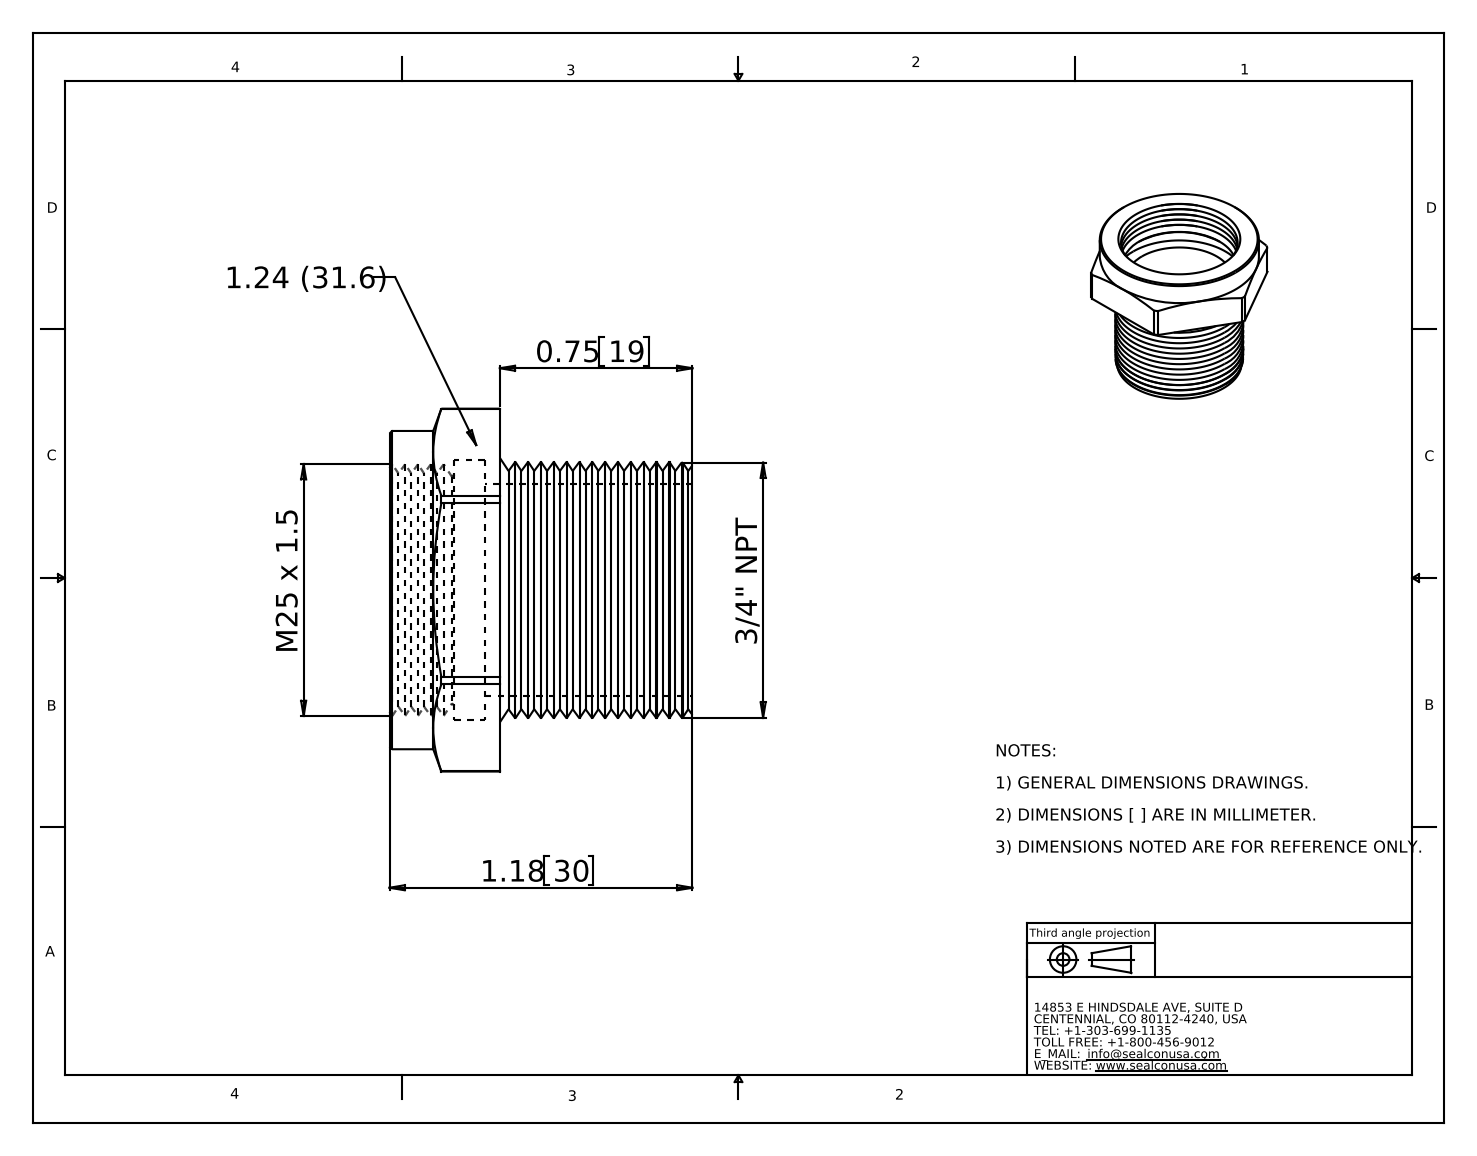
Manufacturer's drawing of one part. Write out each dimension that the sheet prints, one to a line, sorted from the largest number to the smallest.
M25 x 1.5
1.18 30
0.75 19
3/4" NPT
